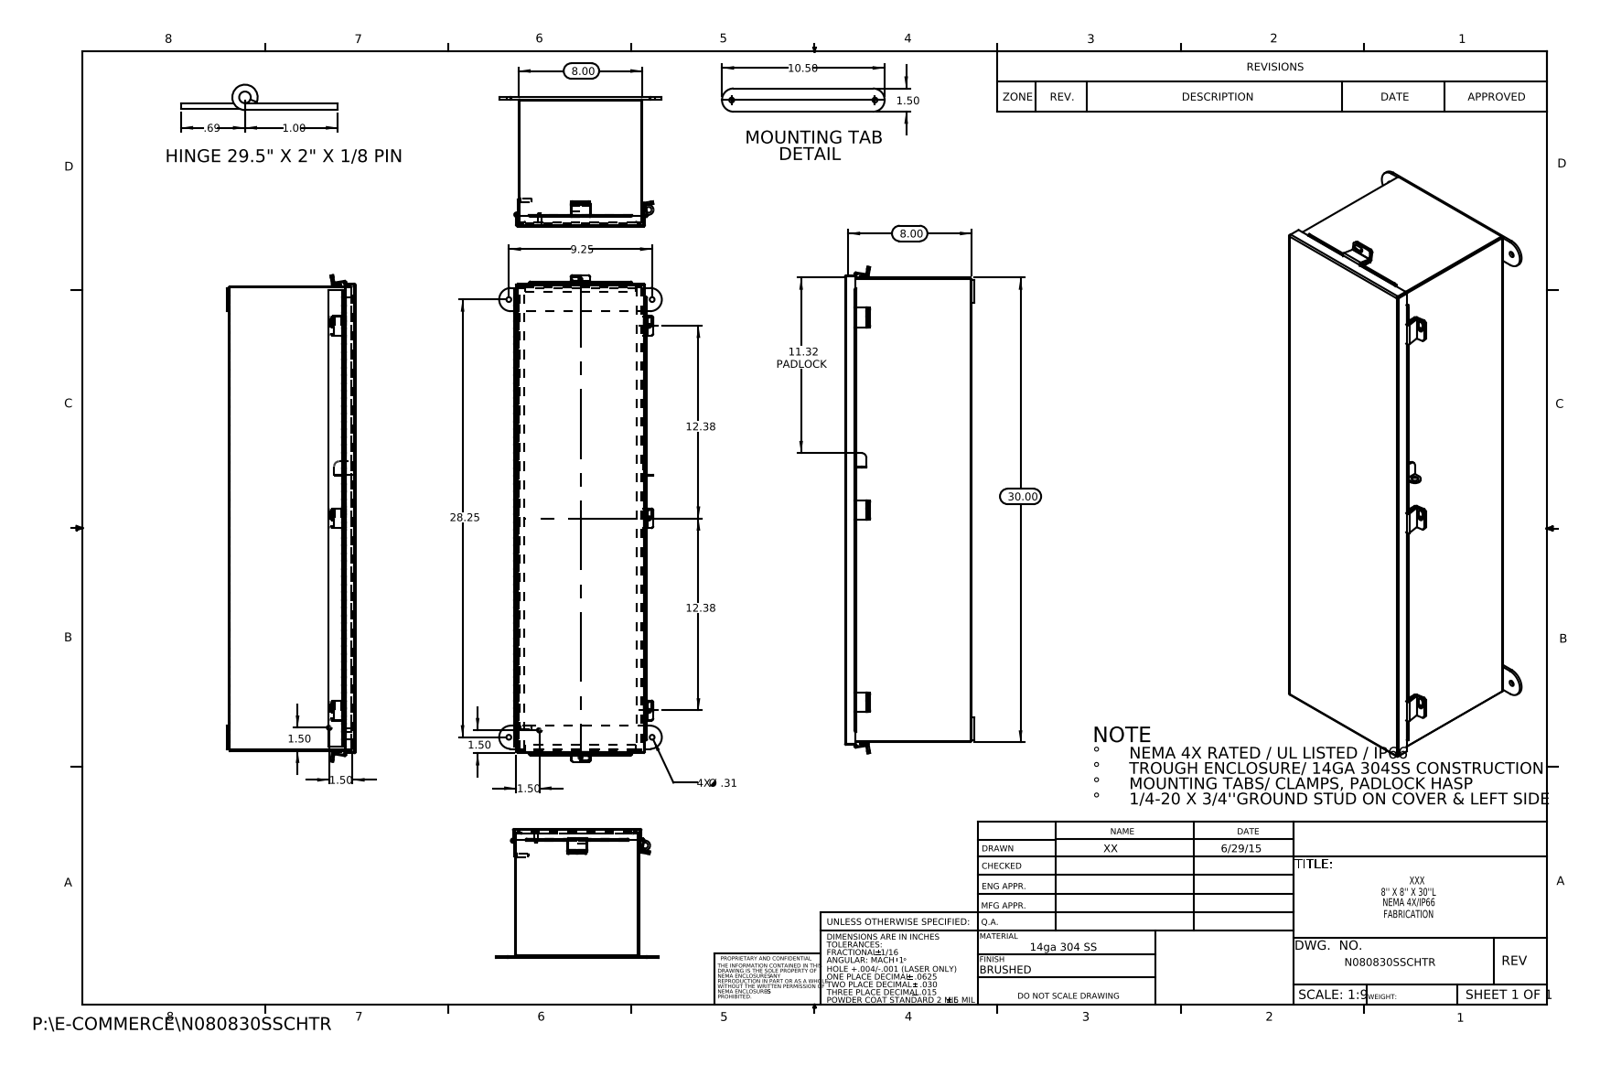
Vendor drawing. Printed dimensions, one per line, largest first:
30.00
28.25
12.38
12.38
11.32 PADLOCK
10.50
9.25
8.00
8.00
1.50
1.50
1.50
1.50
1.50
1.00
.69
4X Ø .31
